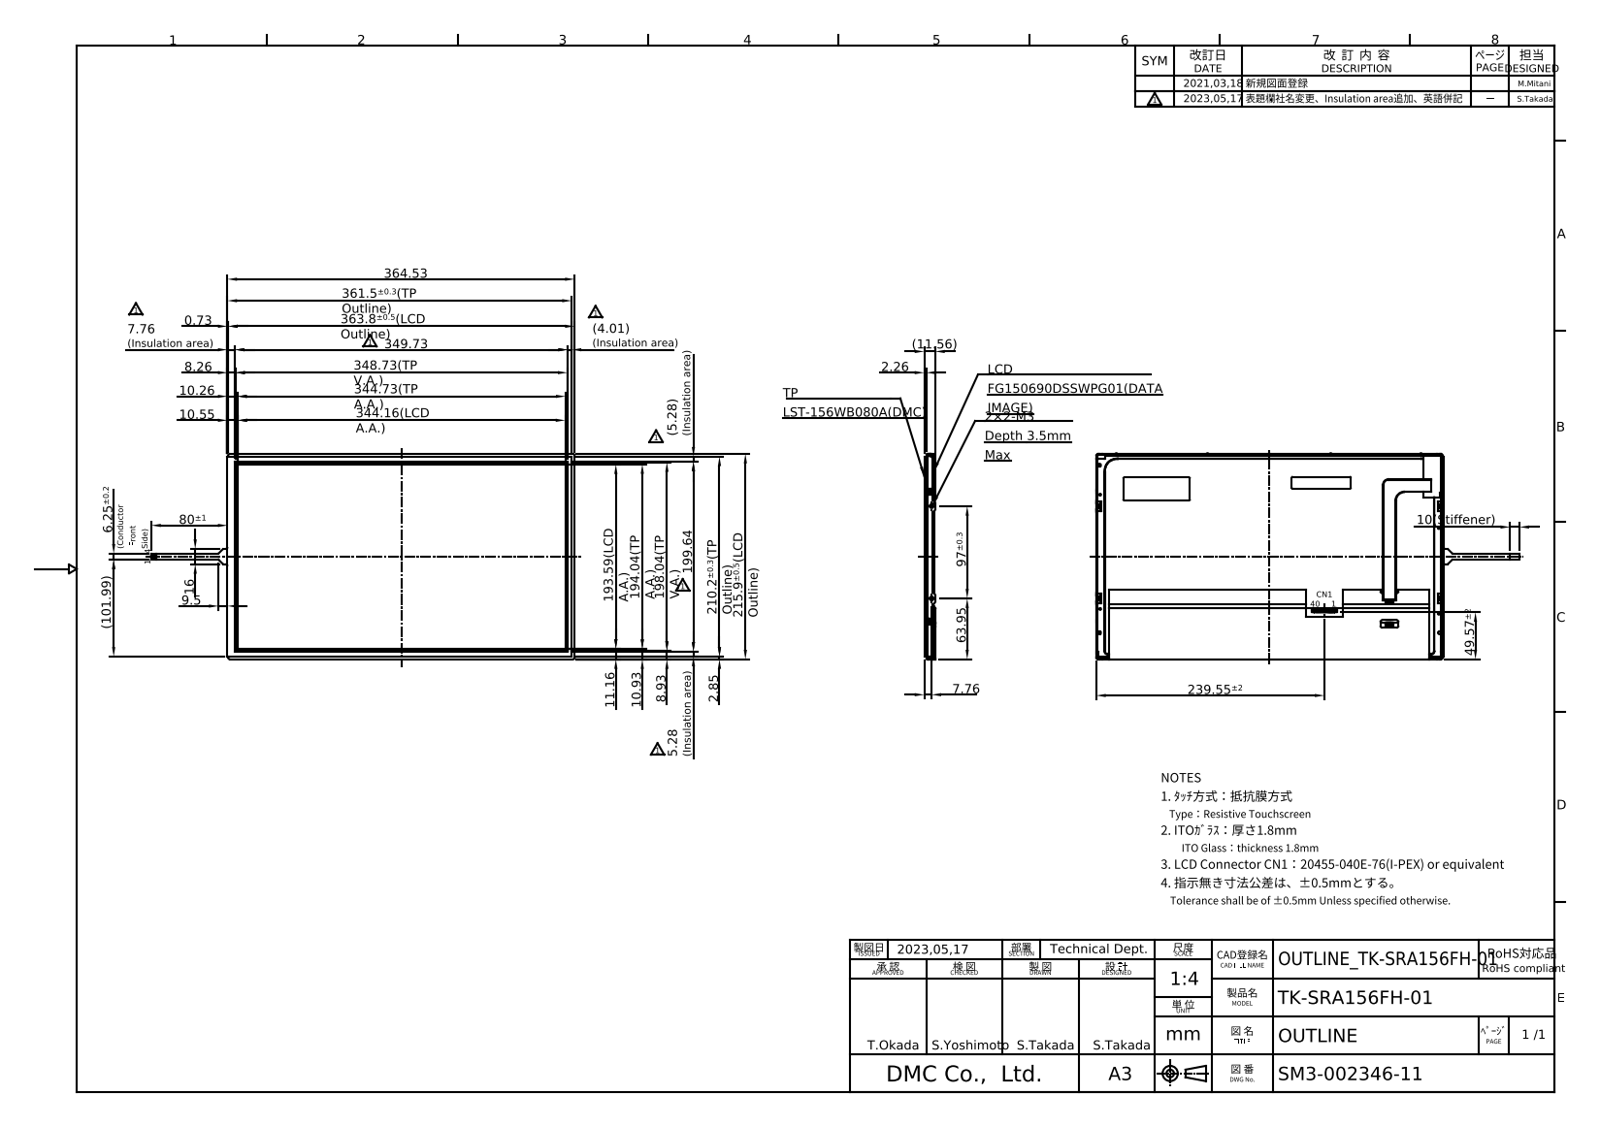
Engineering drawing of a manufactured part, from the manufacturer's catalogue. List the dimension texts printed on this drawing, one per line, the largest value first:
364.53
363.8±0.5(LCD Outline)
361.5±0.3(TP Outline)
349.73
348.73(TP V.A.)
344.73(TP A.A.)
344.16(LCD A.A.)
239.55±2
215.9±0.5(LCD Outline)
210.2±0.3(TP Outline)
199.64
198.04(TP V.A.)
194.04(TP A.A.)
193.59(LCD A.A.)
(101.99)
97±0.3
80±1
63.95
49.57±2
16
(11.56)
11.16
10.93
10.55
10.26
10(Stiffener)
9.5
8.93
8.26
7.76
7.76 (Insulation area)
6.25±0.2
5.28 (Insulation area)
(5.28) (Insulation area)
(4.01) (Insulation area)
2.85
2.26
0.73
